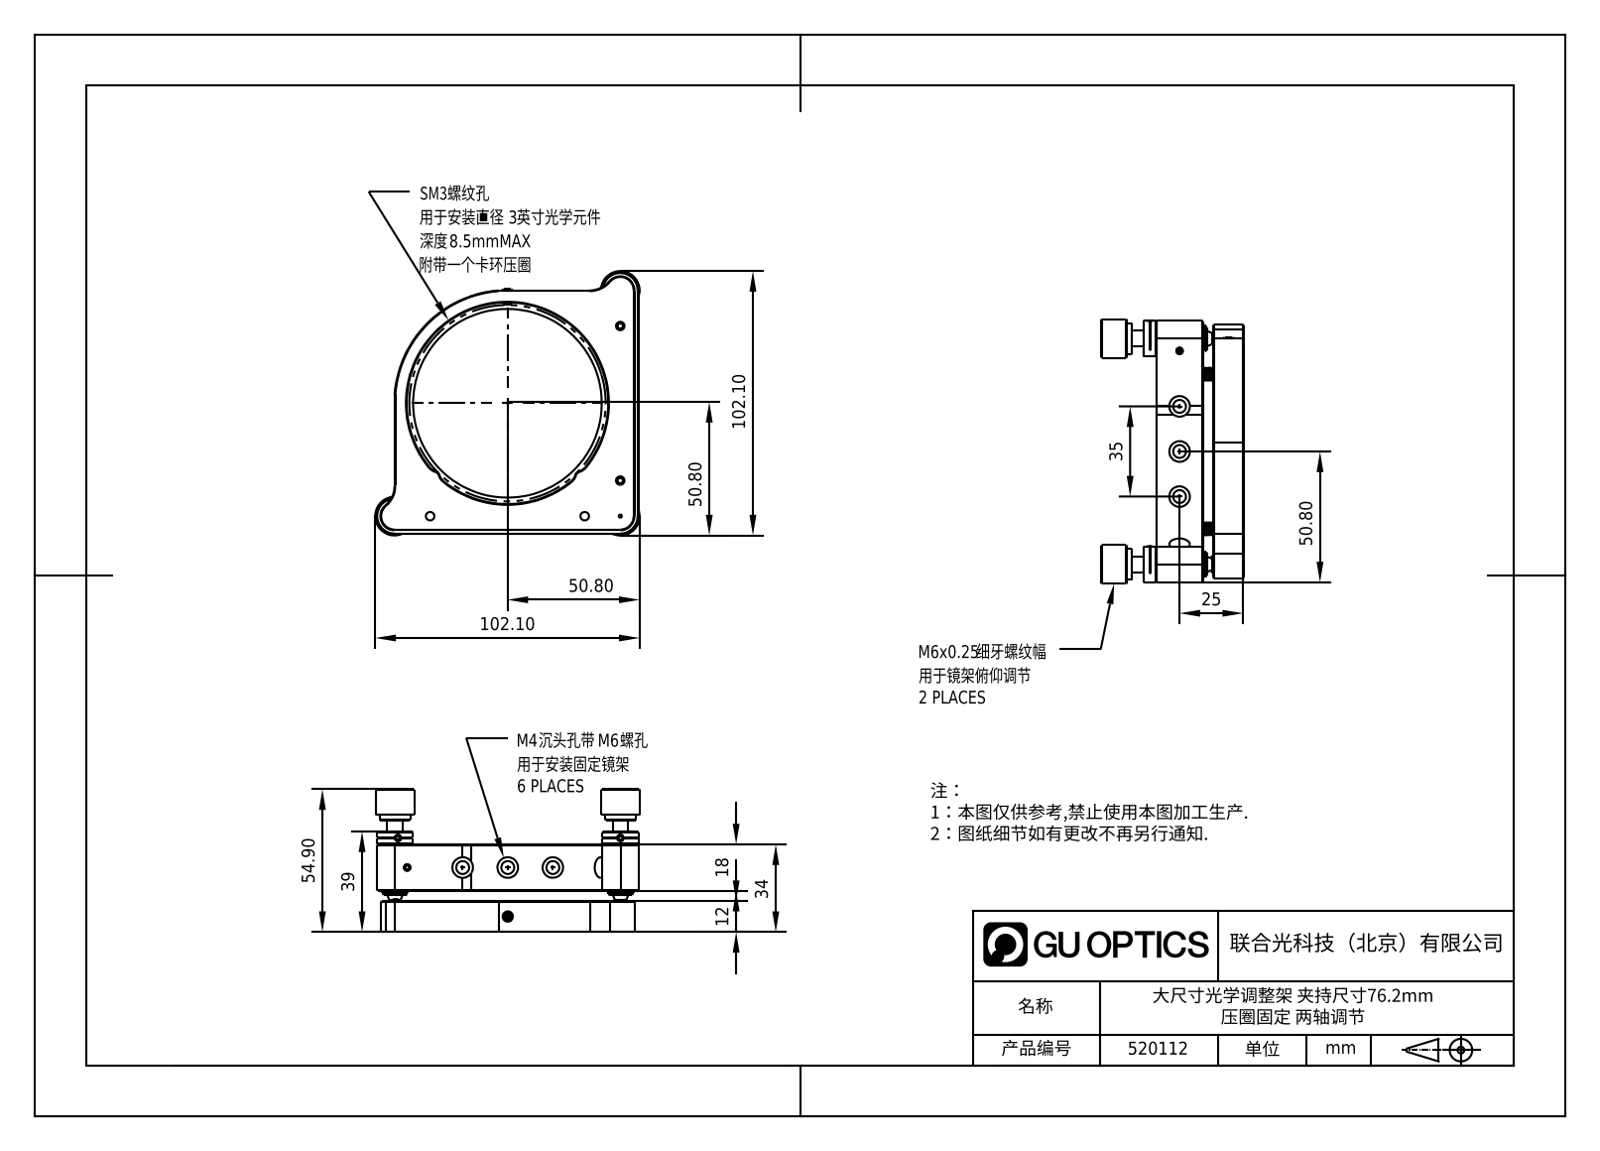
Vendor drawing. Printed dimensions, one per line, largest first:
102.10
102.10
54.90
50.80
50.80
50.80
39
35
34
25
18
12
